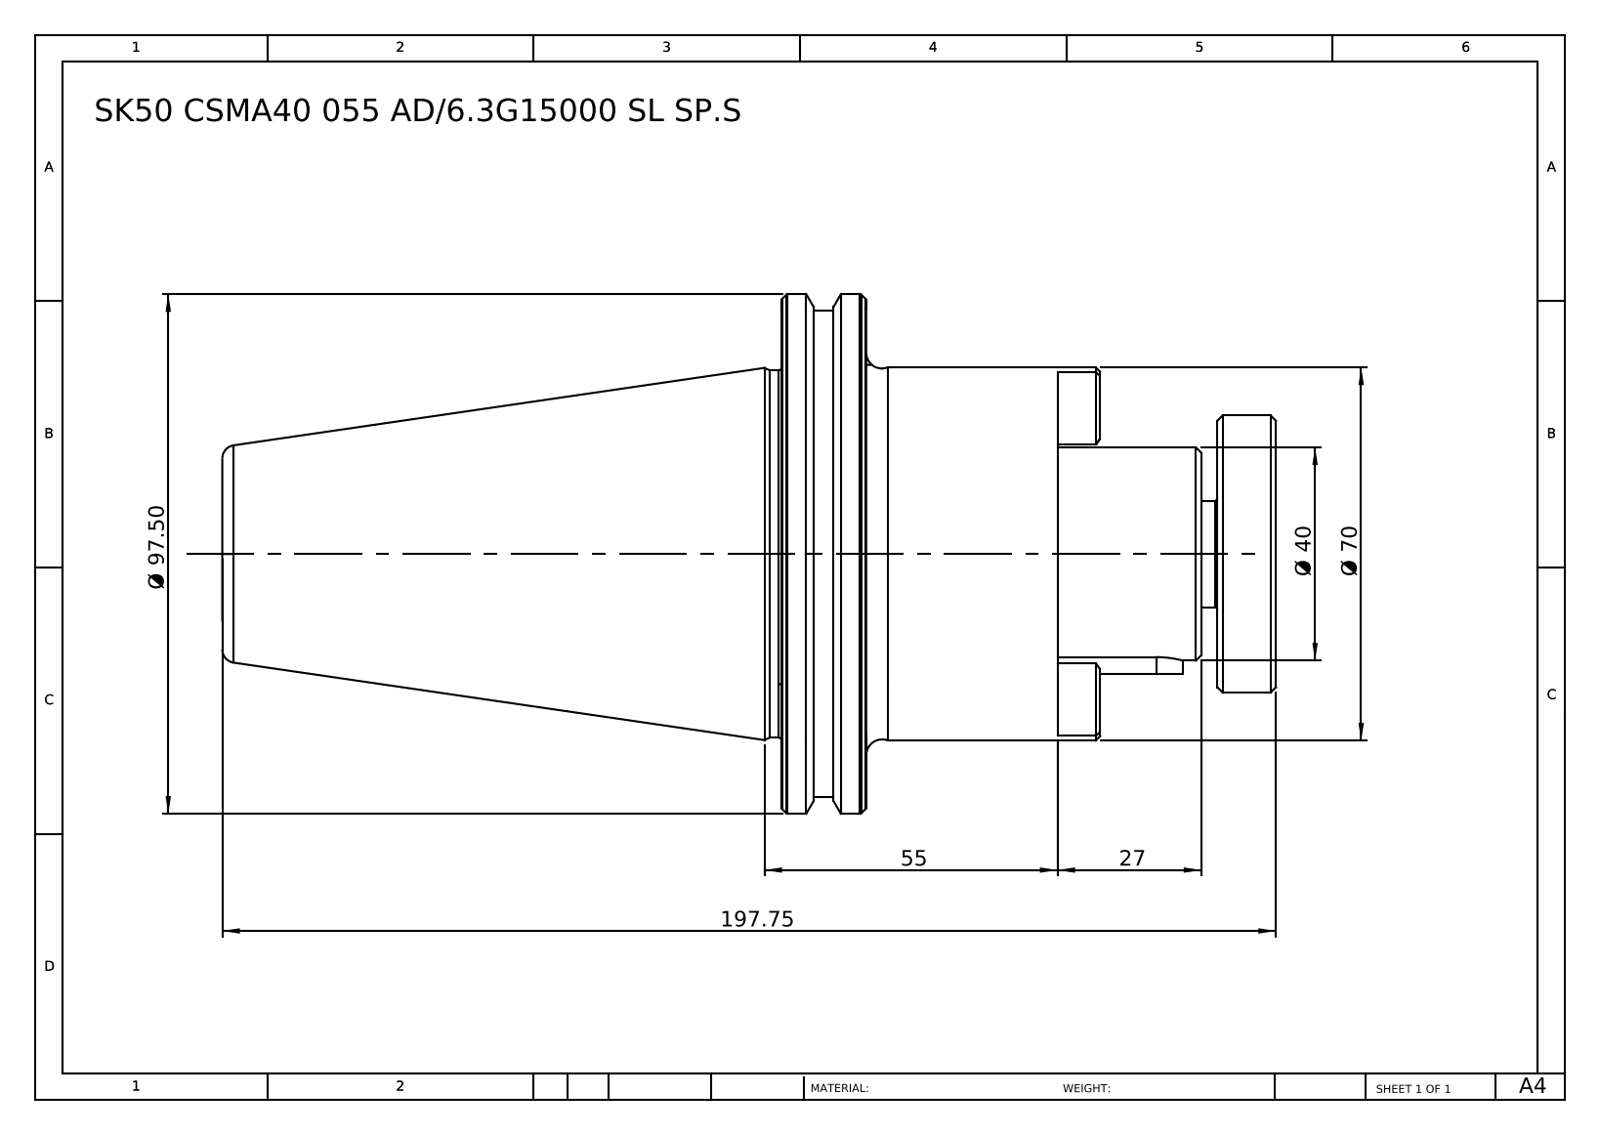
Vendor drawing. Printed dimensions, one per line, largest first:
197.75
Ø 97.50
Ø 70
55
Ø 40
27
